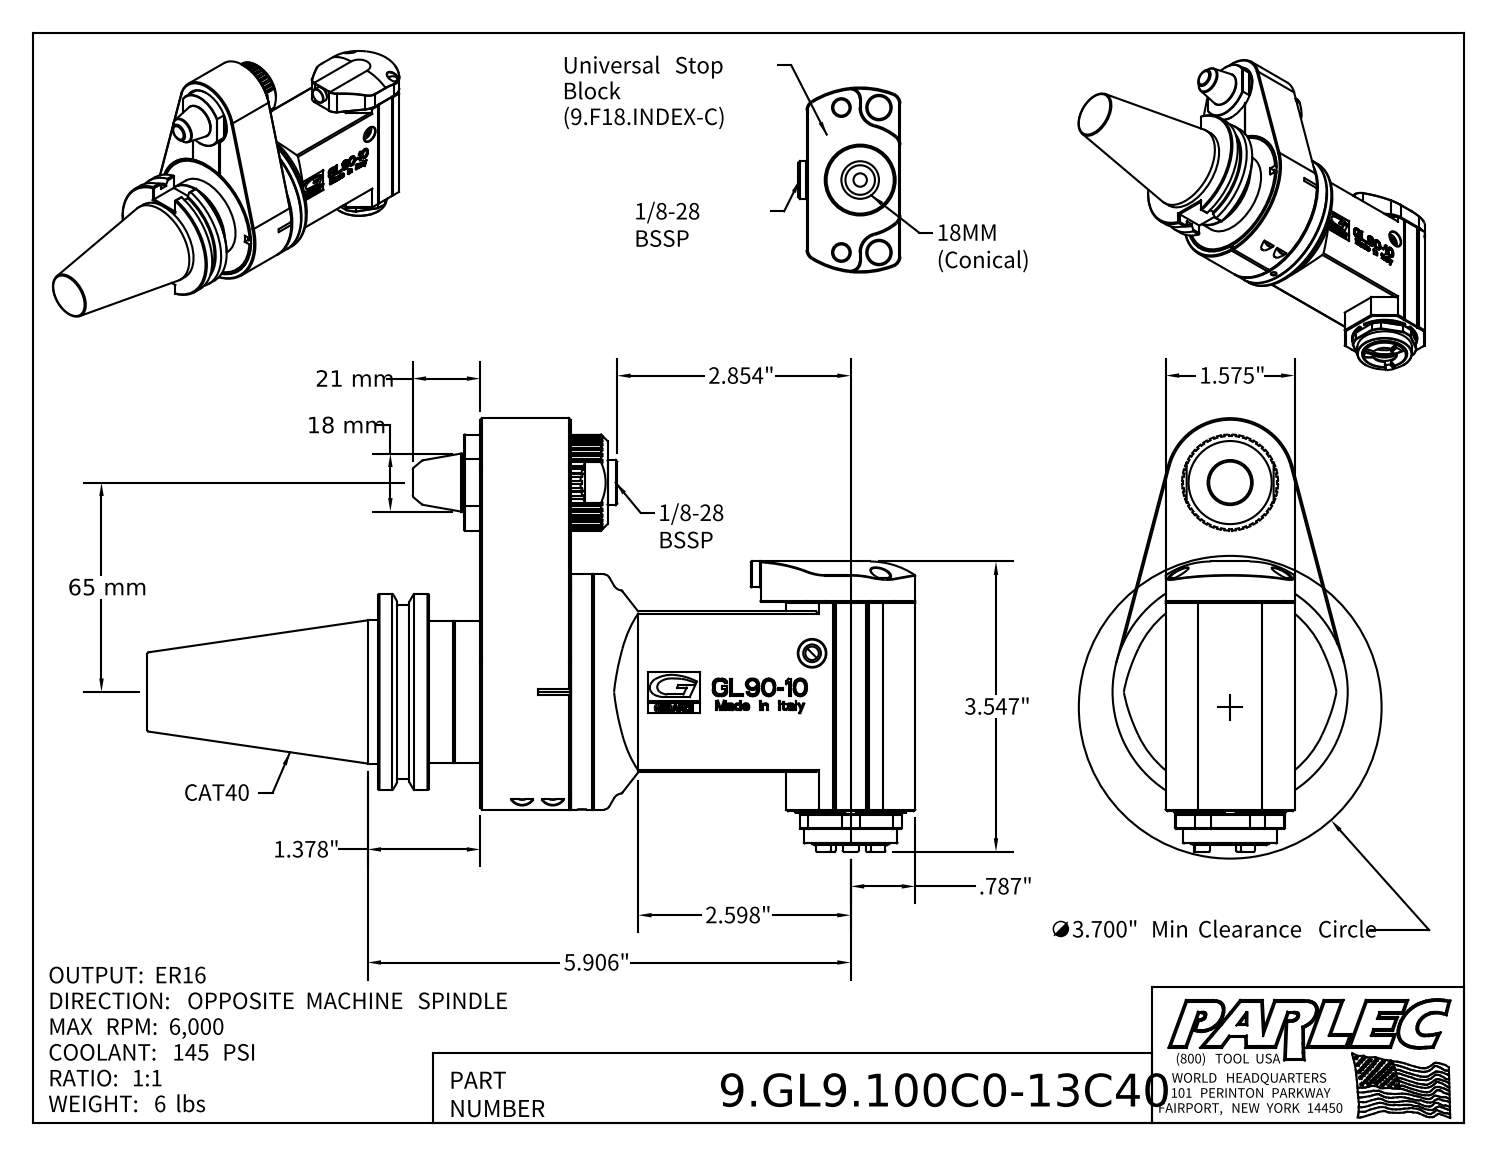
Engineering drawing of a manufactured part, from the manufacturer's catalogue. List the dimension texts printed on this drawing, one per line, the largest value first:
65 mm
21 mm
18 mm
5.906"
∅3.700" Min Clearance Circle
3.547"
2.854"
2.598"
1.575"
1.378"
.787"
